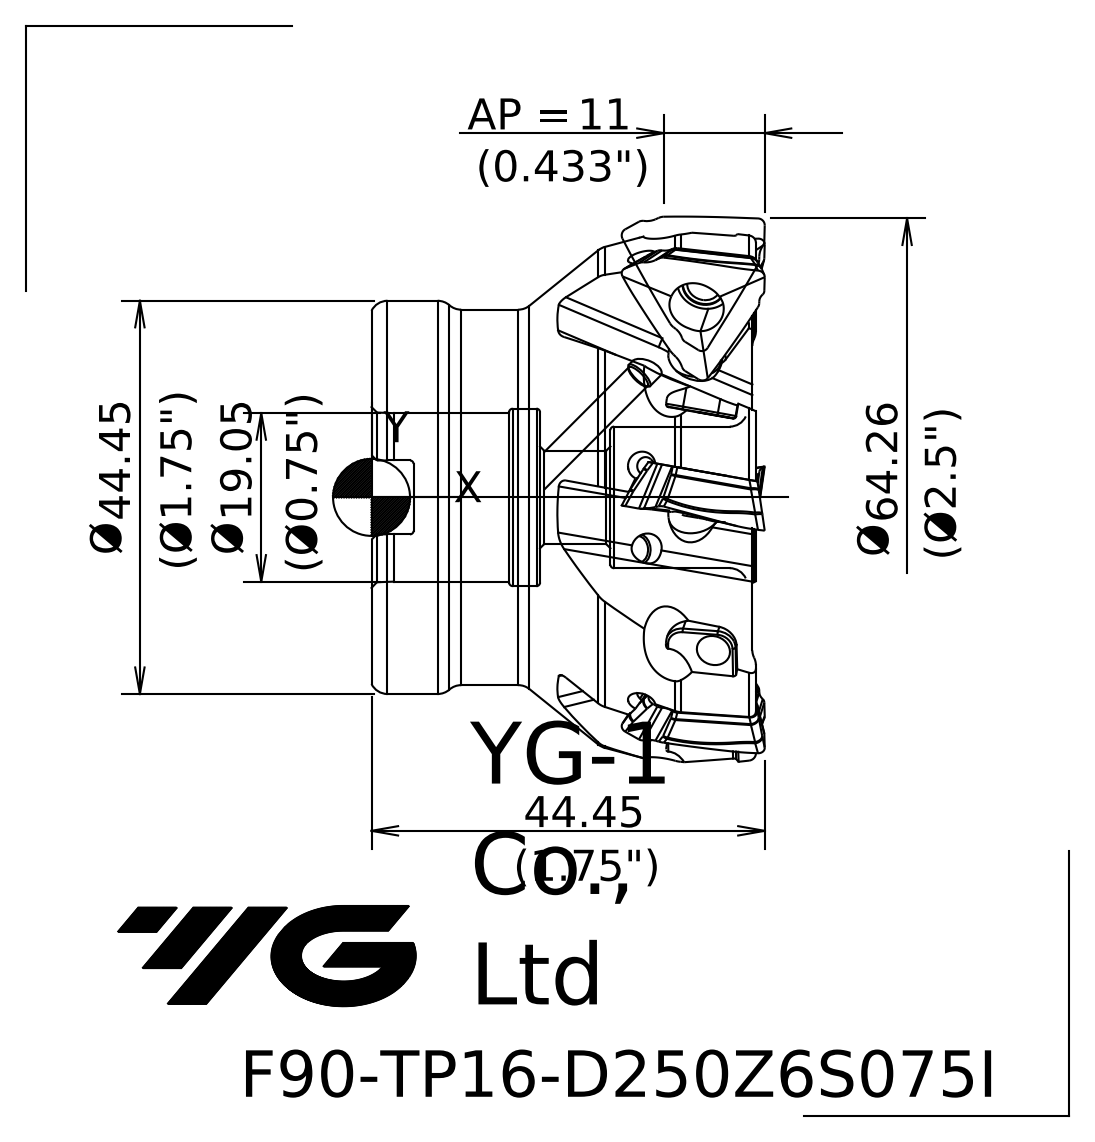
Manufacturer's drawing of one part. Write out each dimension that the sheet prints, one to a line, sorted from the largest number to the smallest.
64.26 Ø
44.45
19.05 Ø
AP = 11
